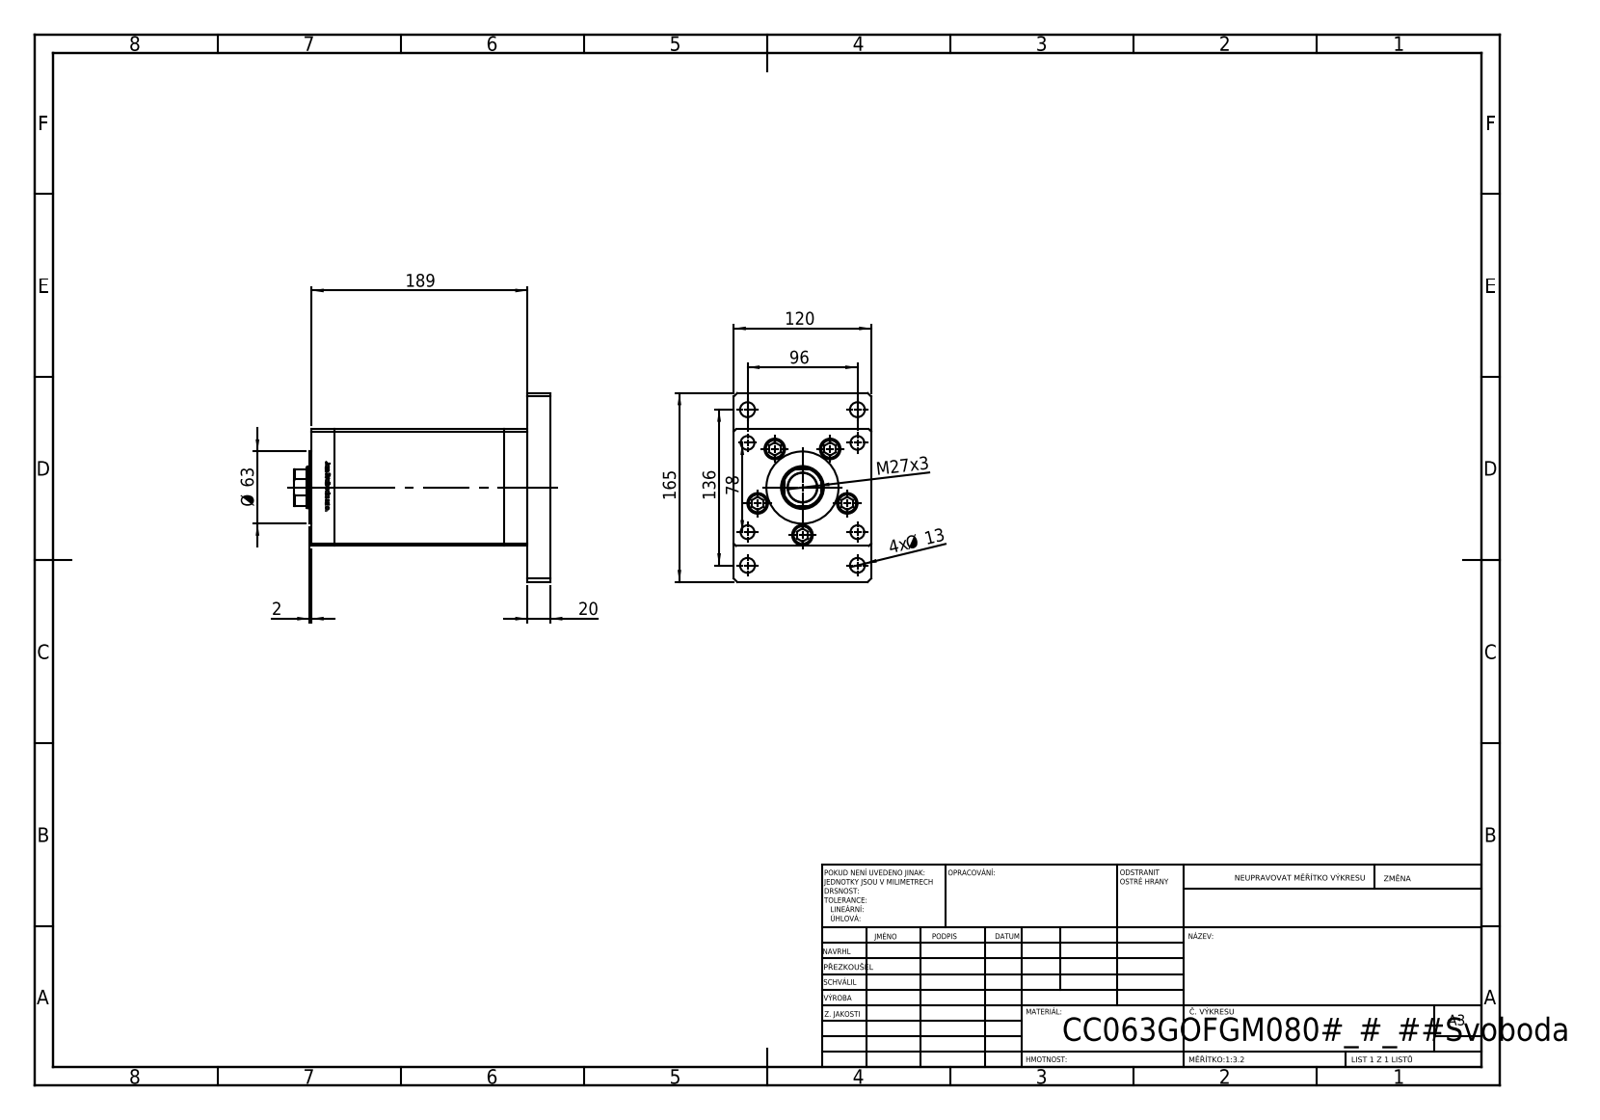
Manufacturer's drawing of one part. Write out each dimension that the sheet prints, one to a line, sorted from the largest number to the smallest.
189
165
136
120
96
78
Ø 63
M27x3
20
4x Ø 13
2
